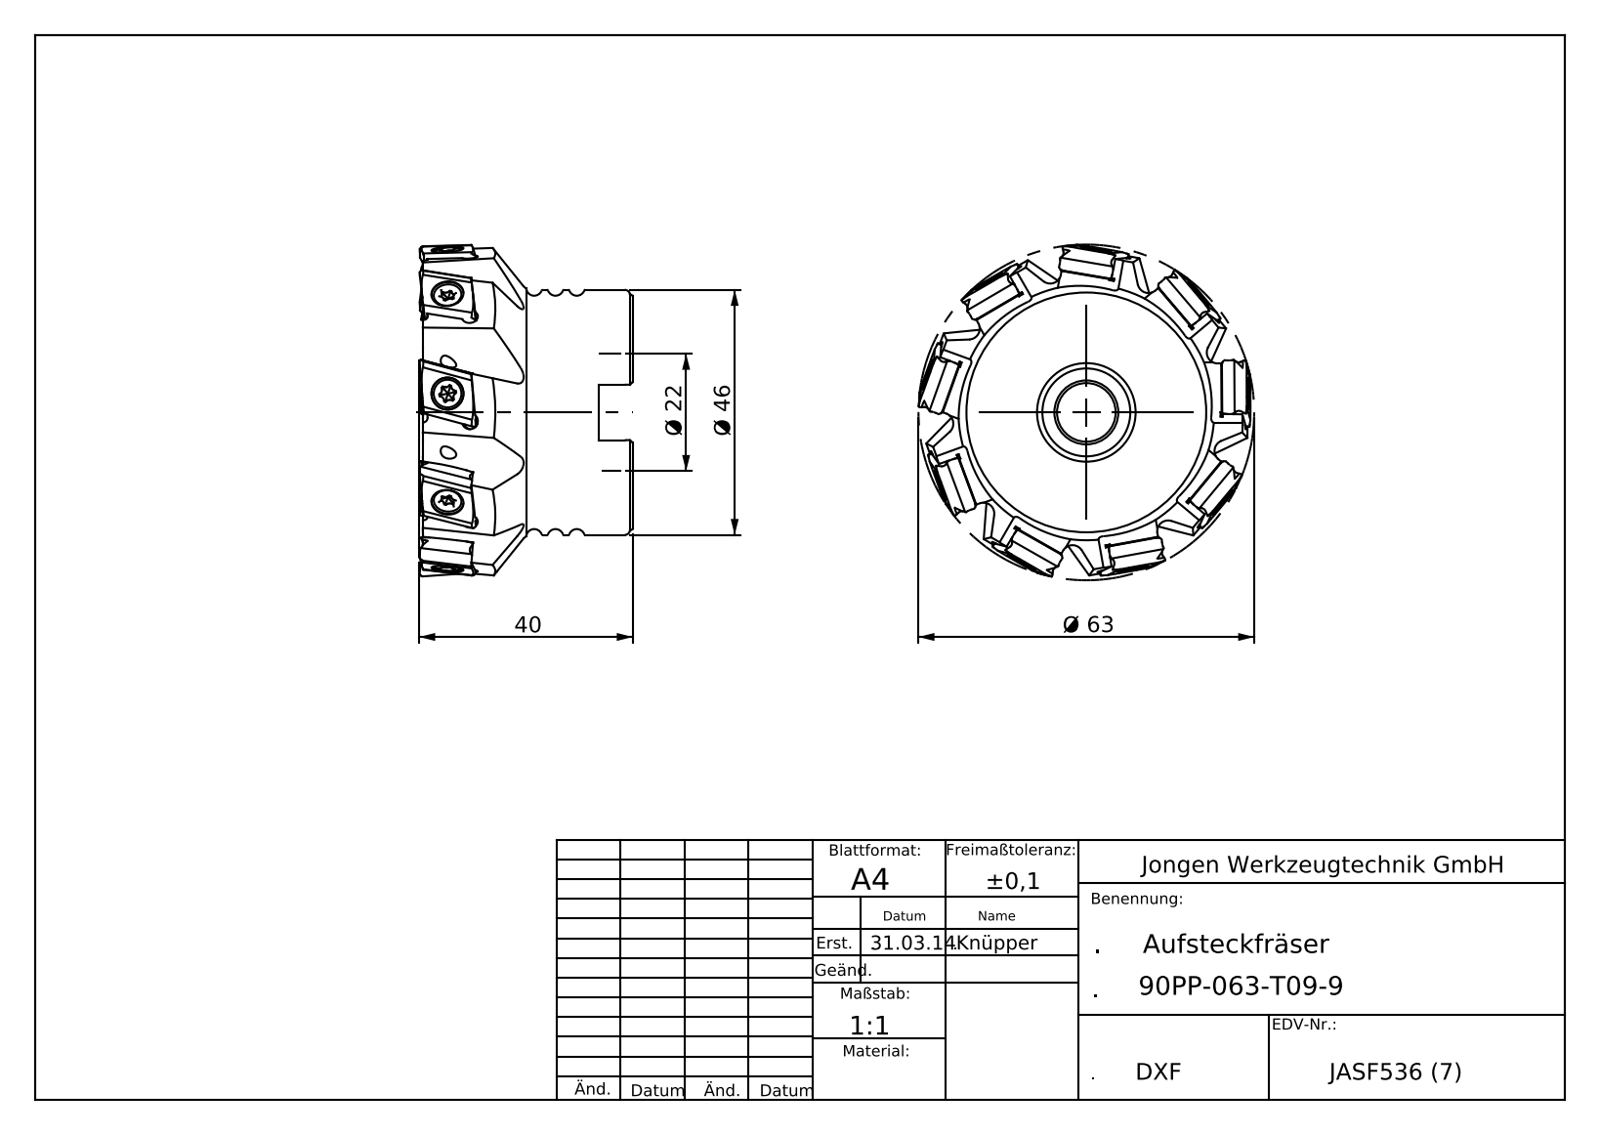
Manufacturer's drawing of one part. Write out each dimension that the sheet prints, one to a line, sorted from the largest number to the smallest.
Ø 63
Ø 46
40
Ø 22
